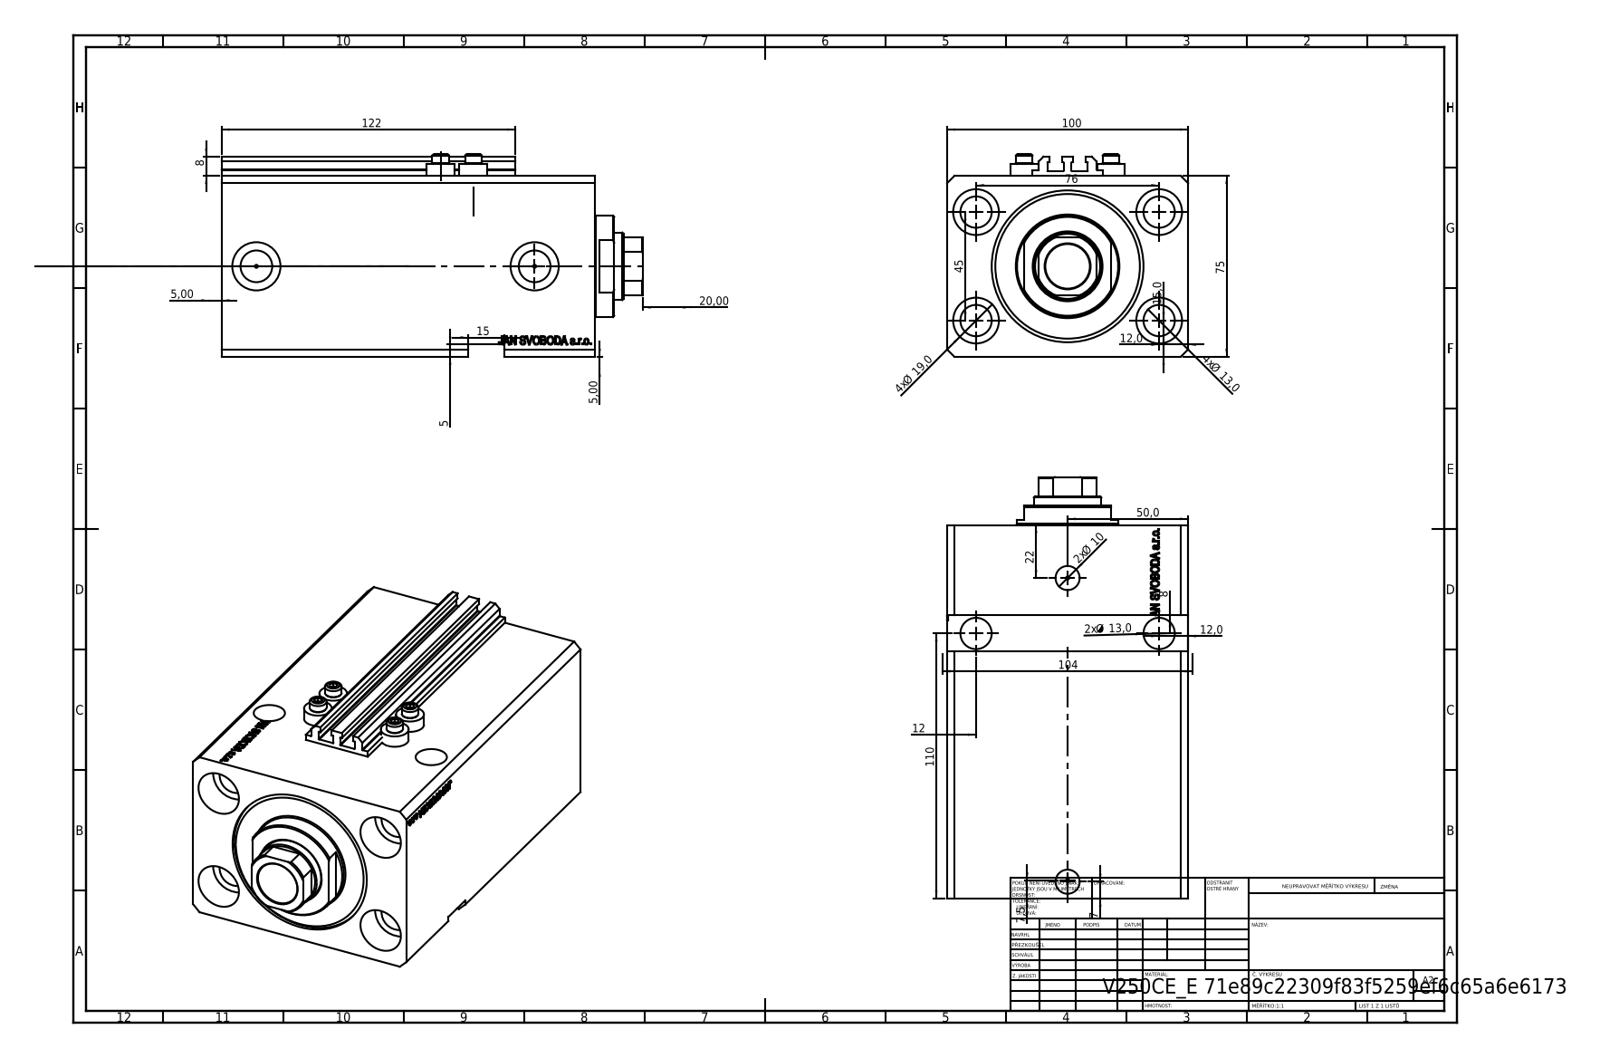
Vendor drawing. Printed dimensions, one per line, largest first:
122
110
104
100
76
75
50,0
45
22
20,00
4x Ø 19,0
15,0
15
4x Ø 13,0
2x Ø 13,0
12,0
12,0
12
2x Ø 10
8
8
7,5
7
5,00
5,00
5
